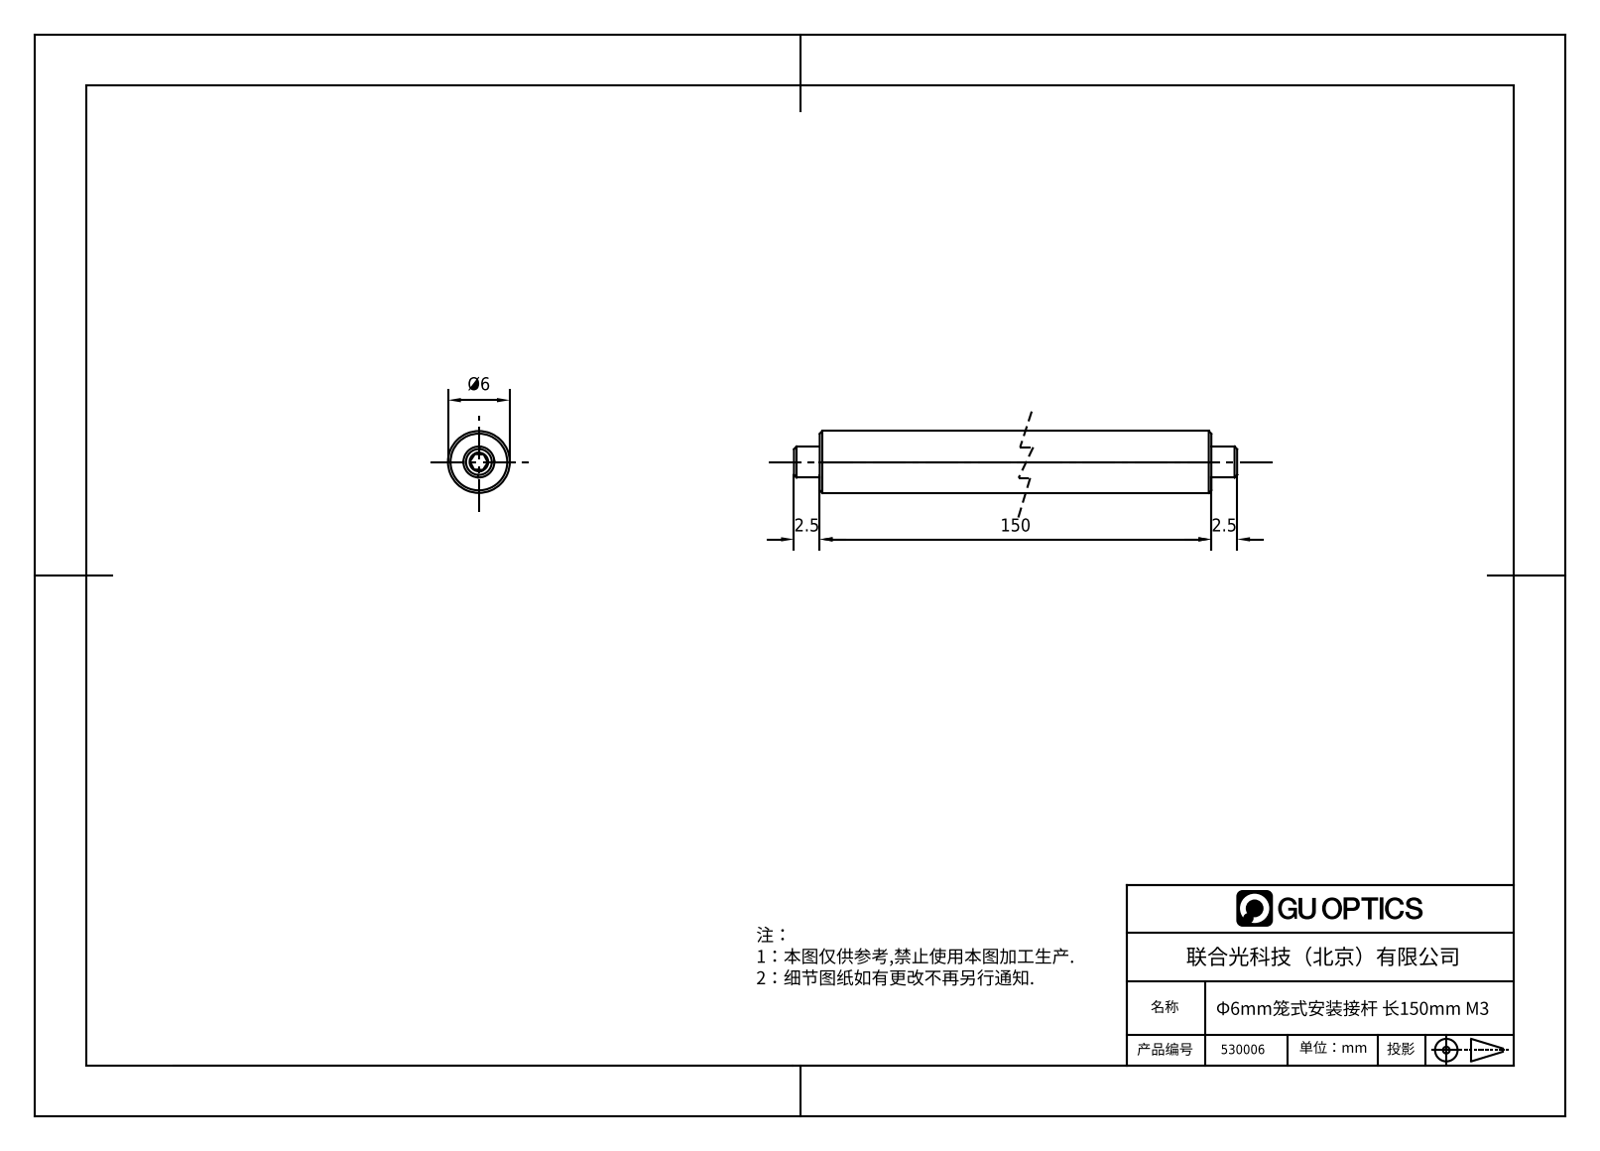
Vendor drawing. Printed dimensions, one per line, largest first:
150
Ø6
2.5
2.5
